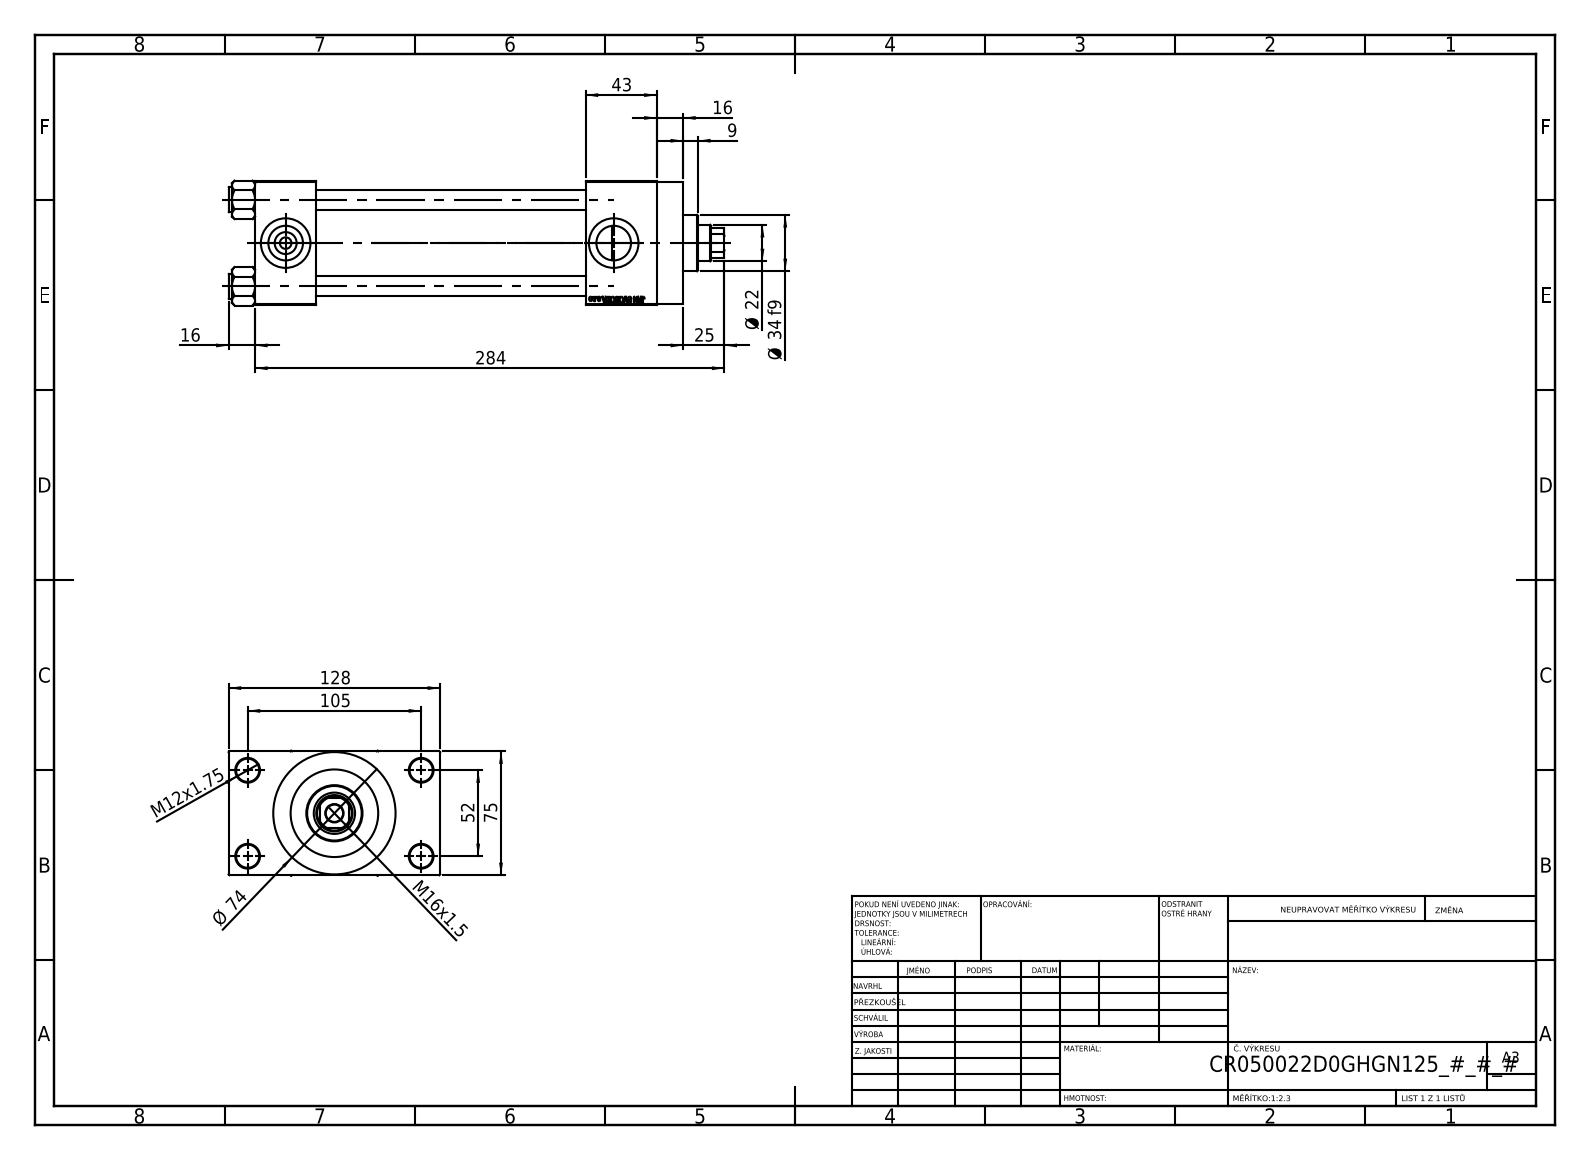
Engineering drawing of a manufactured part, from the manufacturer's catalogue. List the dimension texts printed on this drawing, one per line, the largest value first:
284
128
105
75
Ø 74
52
43
Ø 34 f9
25
Ø 22
16
16
M16x1.5
M12x1.75
9
